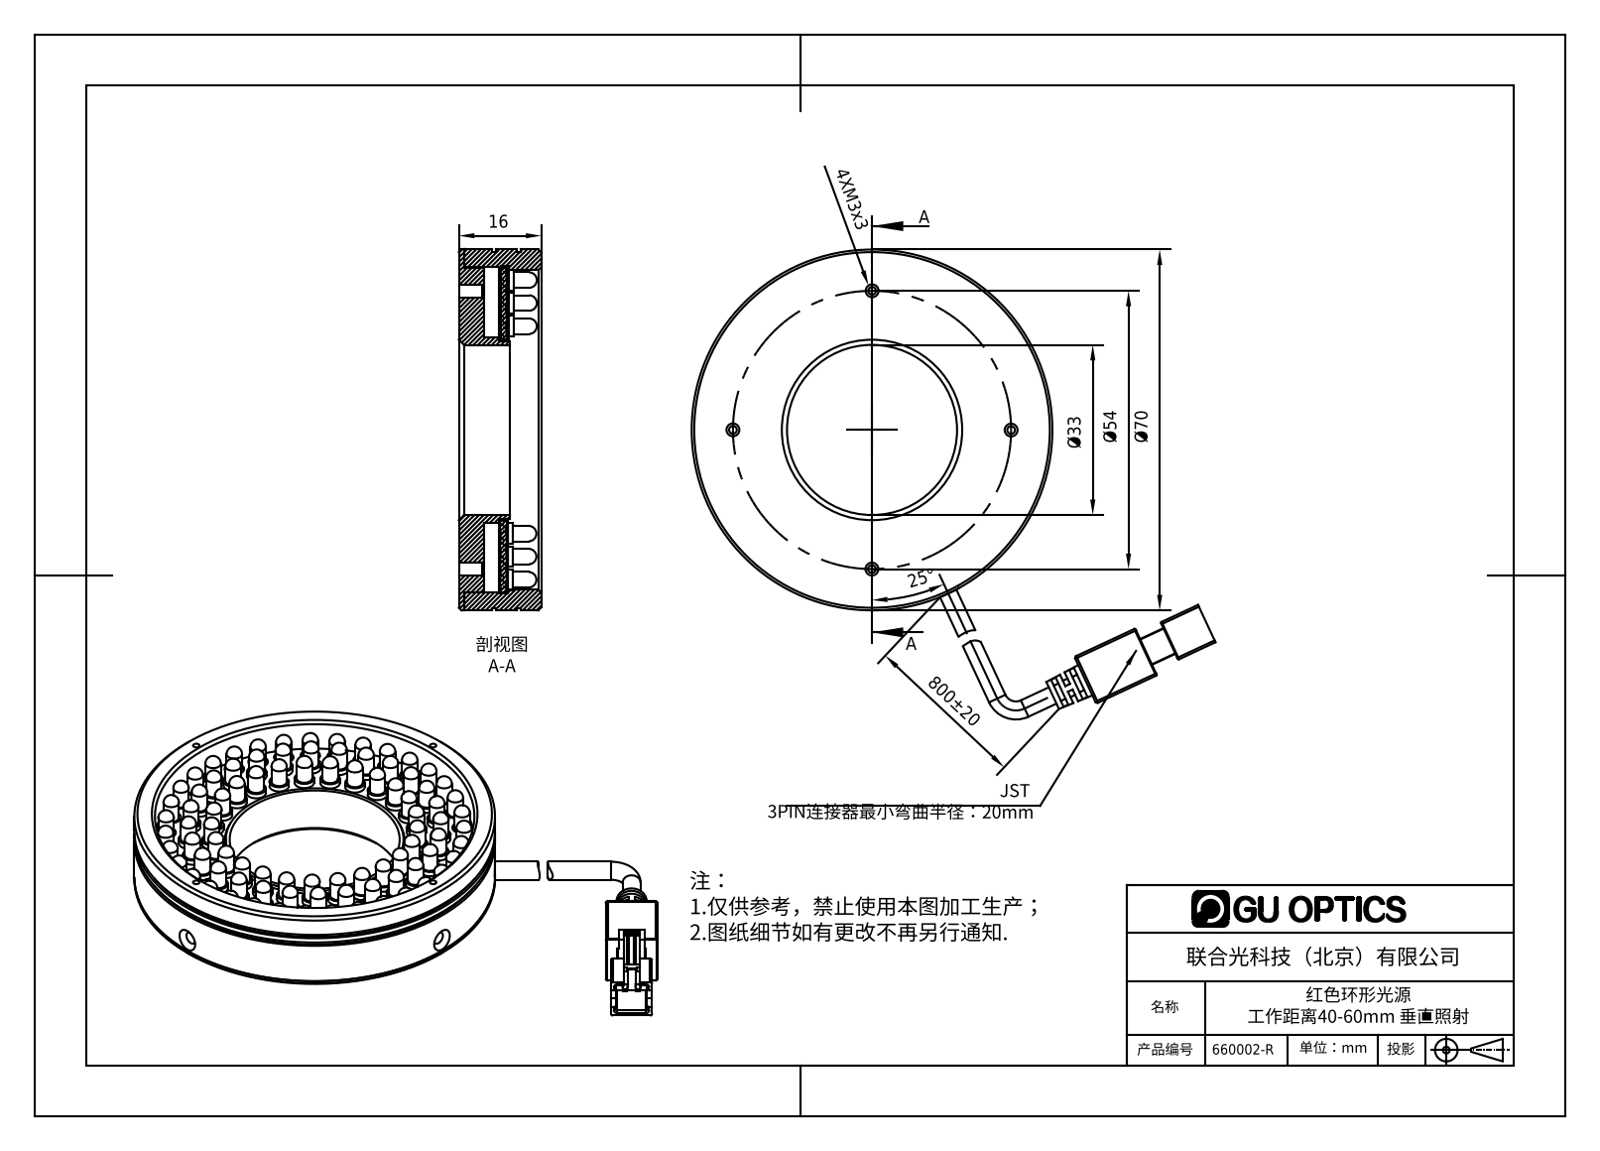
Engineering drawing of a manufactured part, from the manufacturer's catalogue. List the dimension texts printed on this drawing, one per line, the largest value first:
Ø70
Ø54
Ø33
25°
16
4XM3x3
